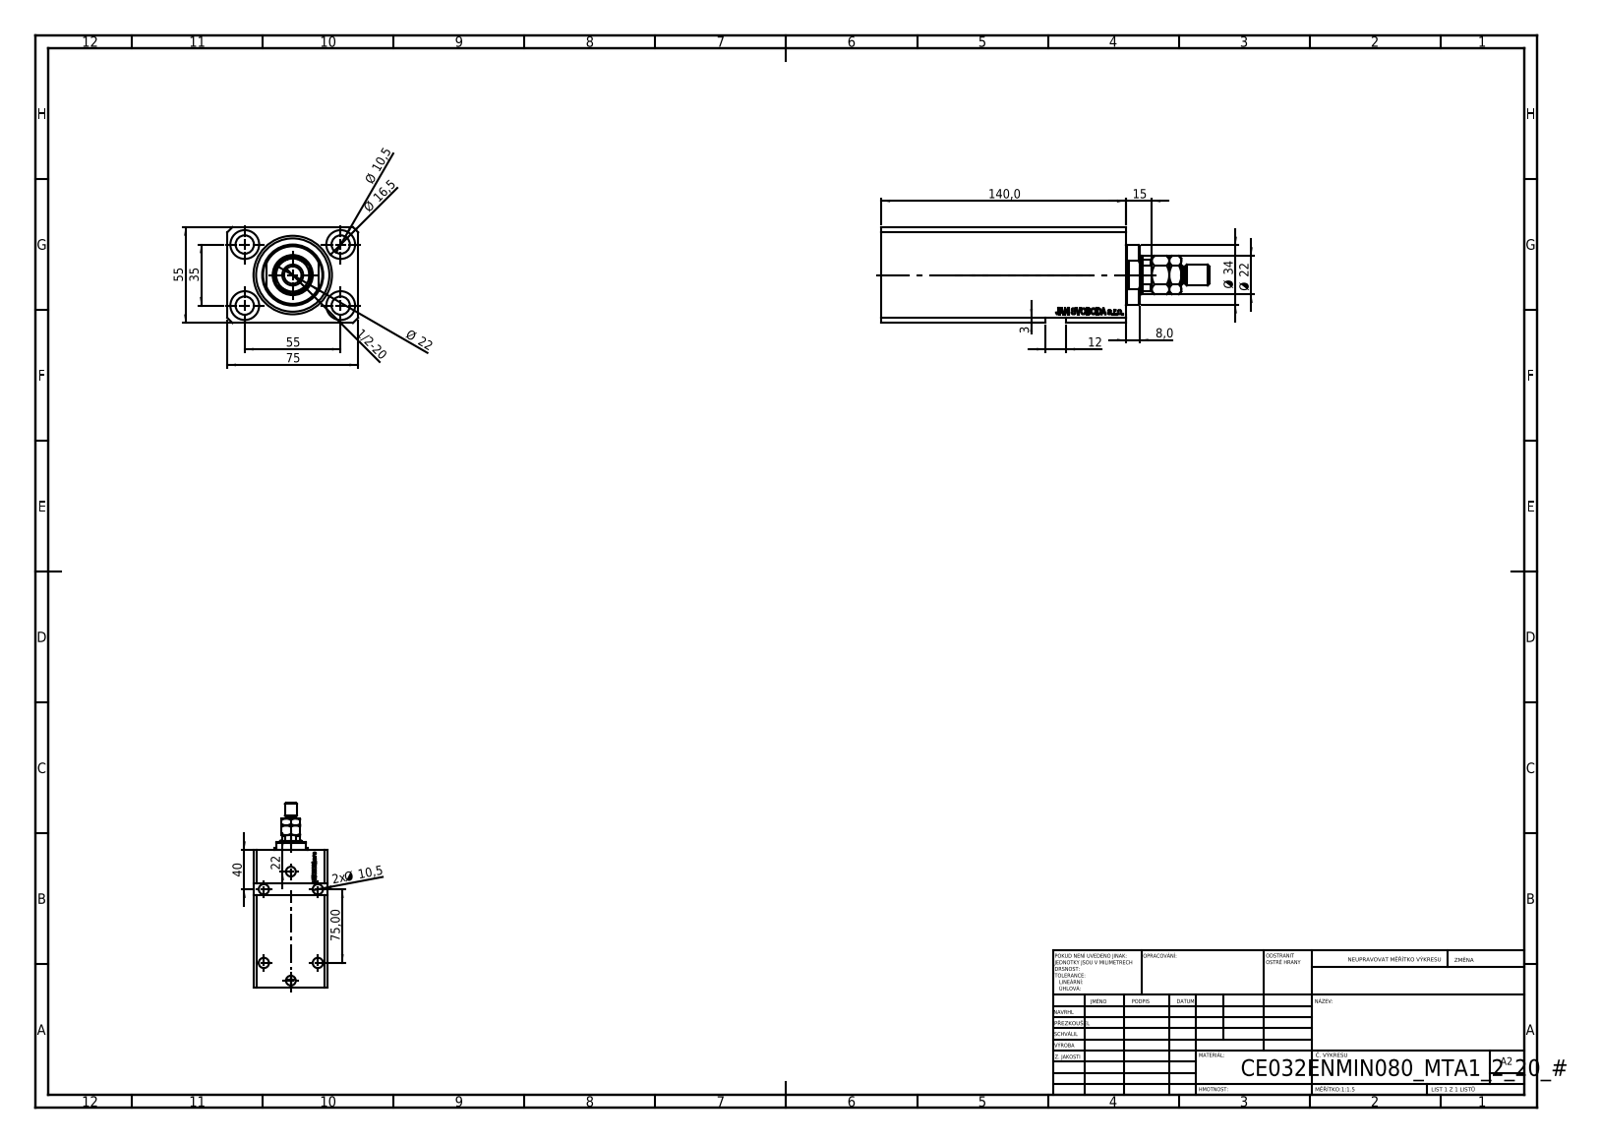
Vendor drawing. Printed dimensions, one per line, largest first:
140,0
75
75,00
55
55
40
35
Ø 34
Ø 22
Ø 22
22
Ø 16,5
15
12
Ø 10,5
2x Ø 10,5
8,0
3
1/2-20
